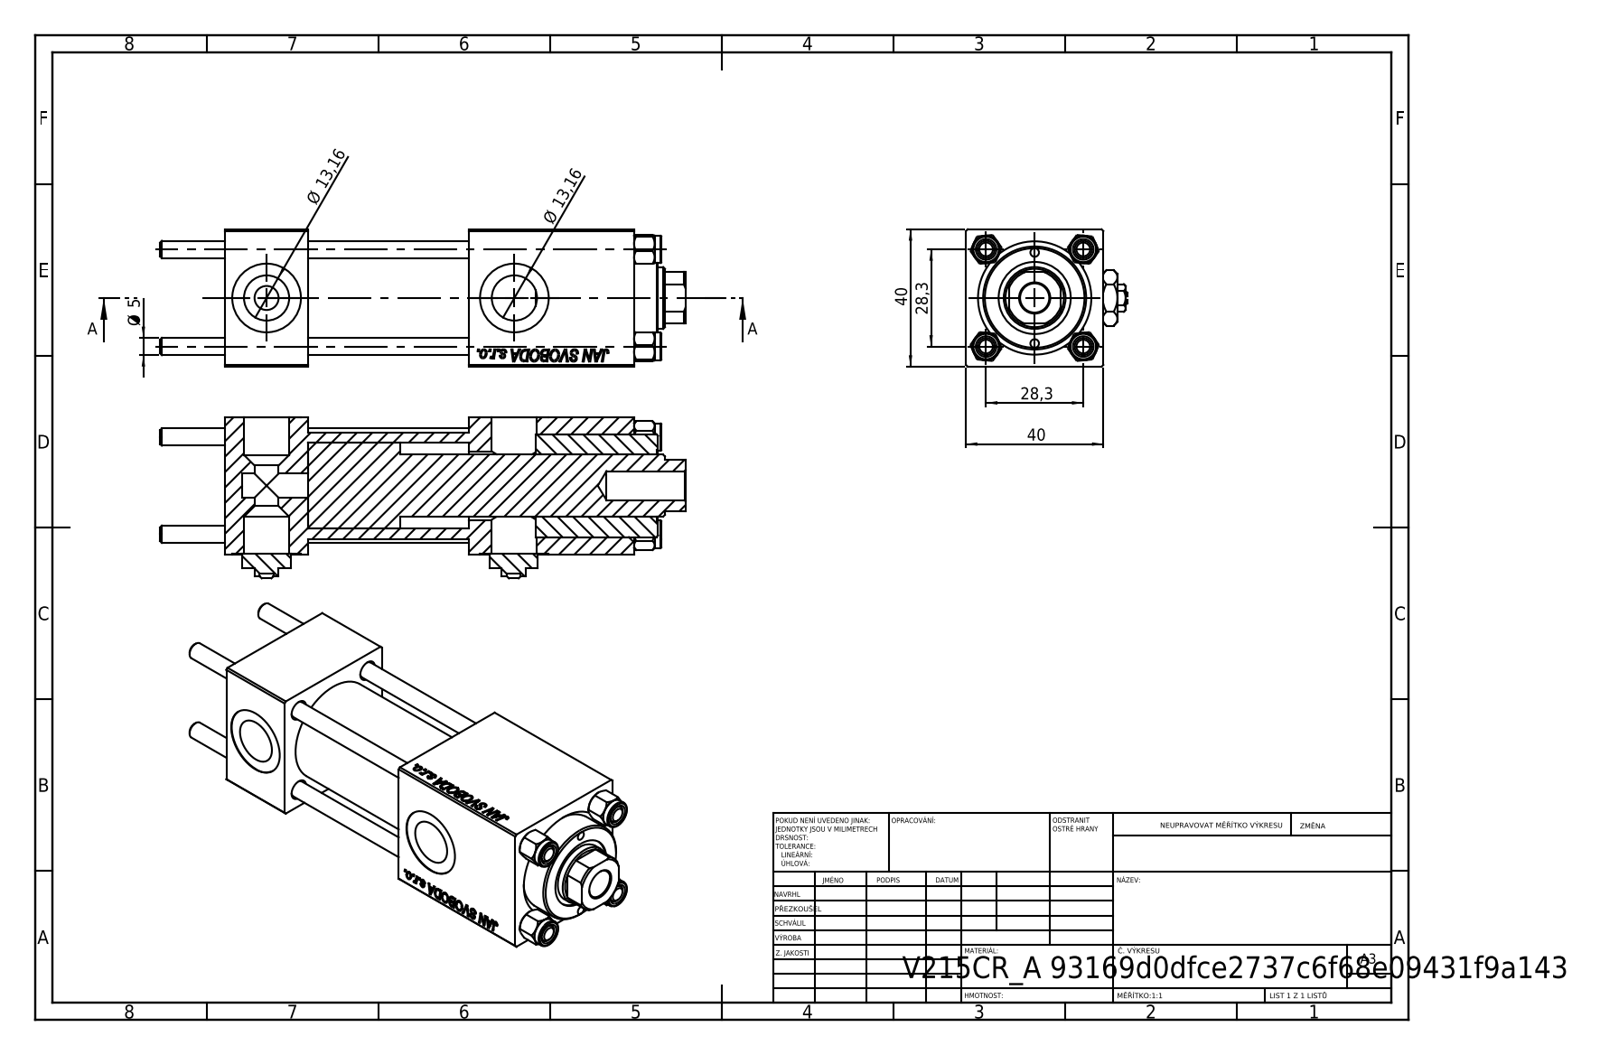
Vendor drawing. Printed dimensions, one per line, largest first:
40
40
28,3
28,3
Ø 13,16
Ø 13,16
Ø 5
